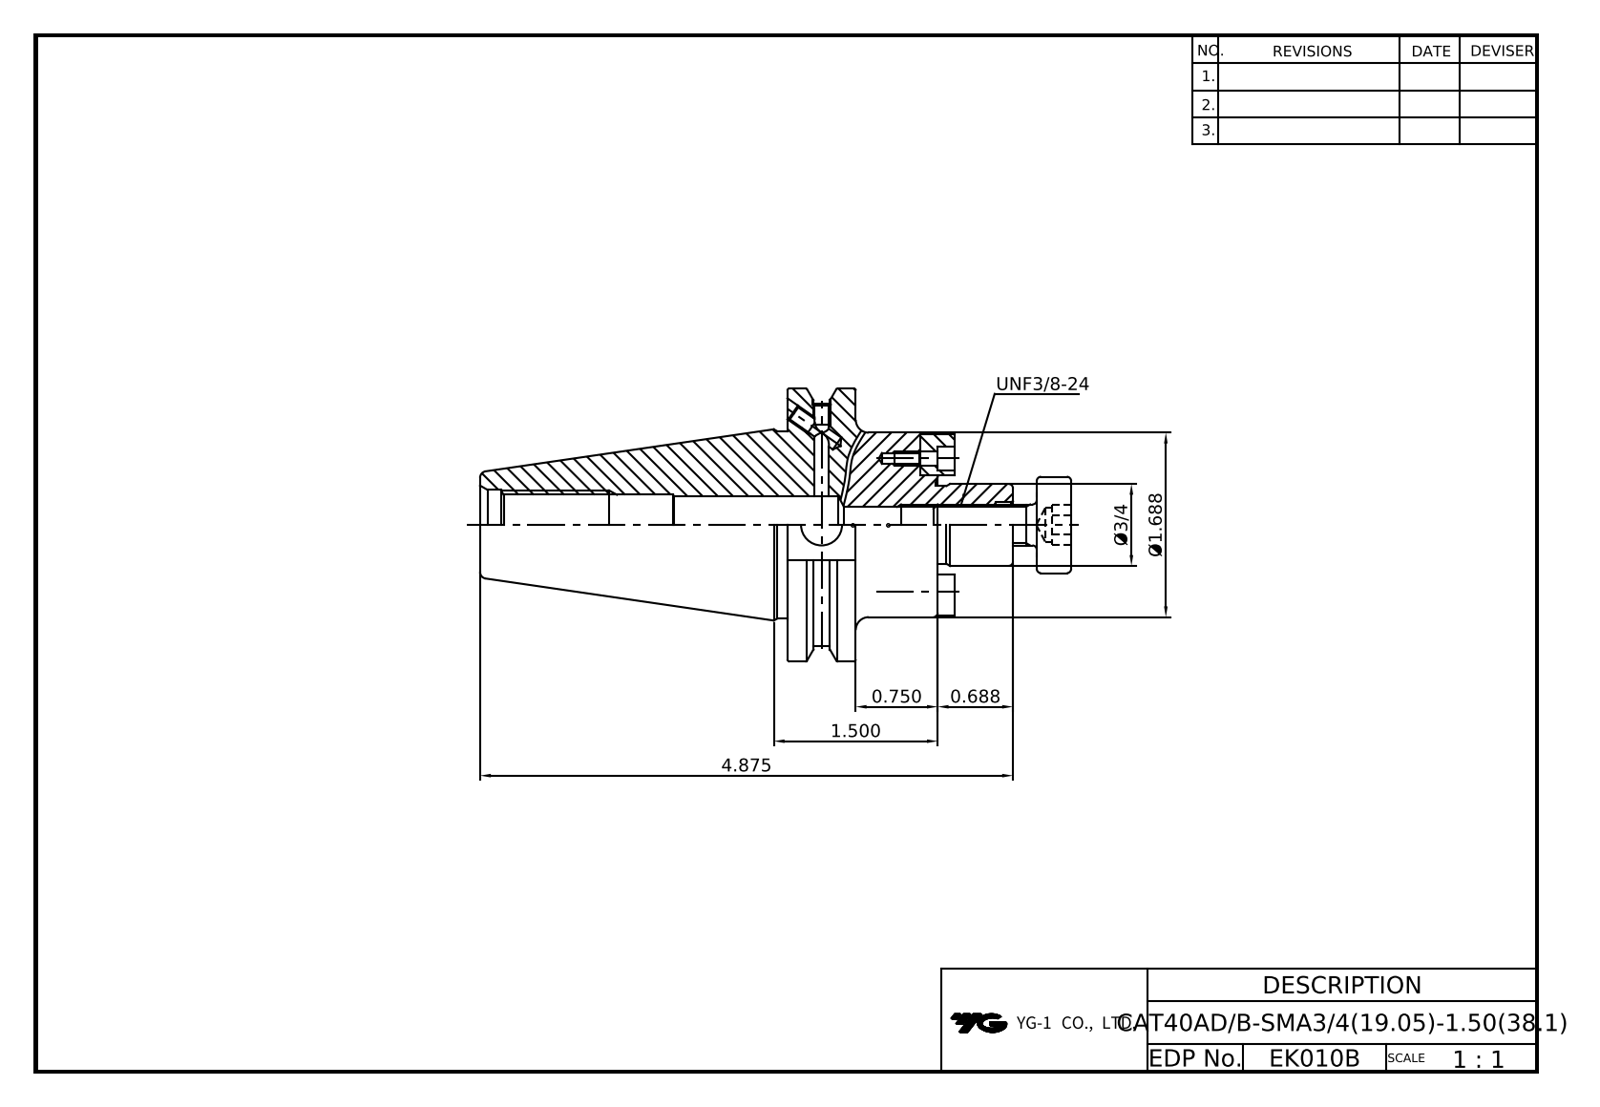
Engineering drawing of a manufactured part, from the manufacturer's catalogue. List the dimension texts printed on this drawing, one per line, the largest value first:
4.875
Ø1.688
1.500
Ø3/4
0.750
0.688
